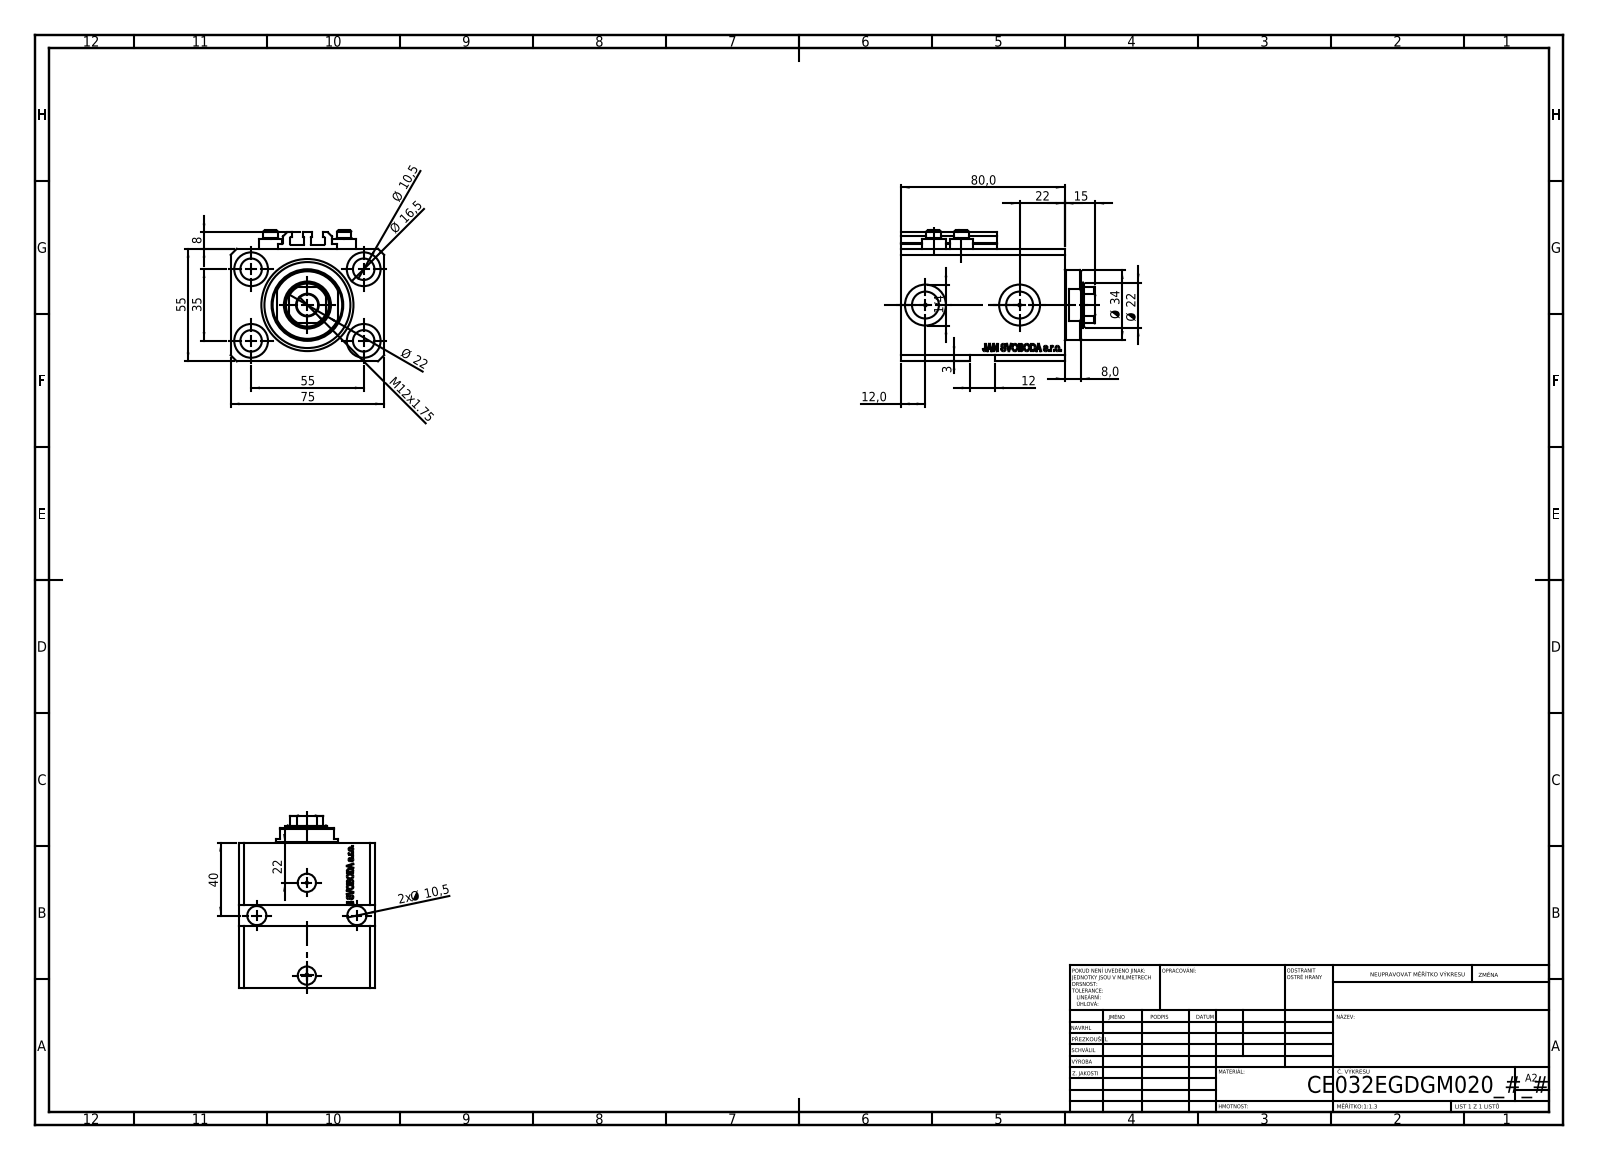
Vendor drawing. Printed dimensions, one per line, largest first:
80,0
75
55
55
40
35
Ø 34
Ø 22
22
Ø 22
22
Ø 16,5
15
M12x1.75
12,0
12
Ø 10,5
2x Ø 10,5
8
8,0
3
1/4
